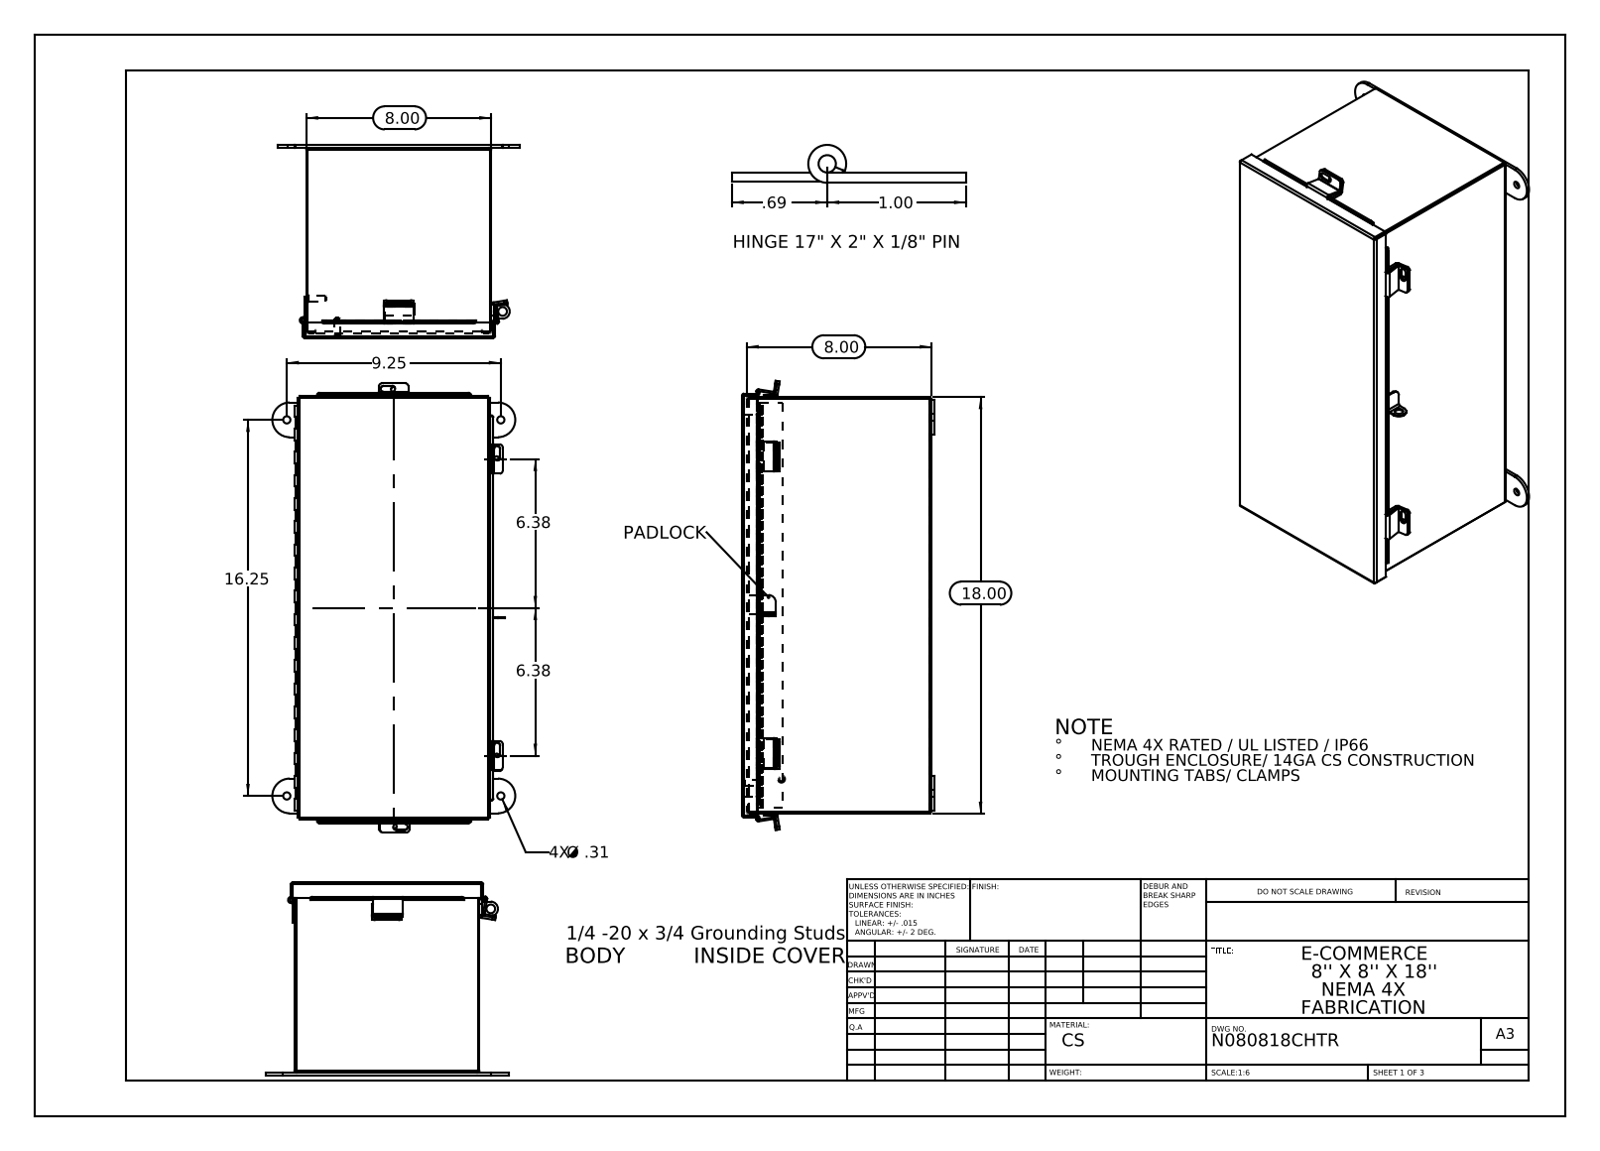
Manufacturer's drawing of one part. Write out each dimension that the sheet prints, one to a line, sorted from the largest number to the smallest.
18.00
16.25
9.25
8.00
8.00
6.38
6.38
1.00
.69
4X Ø .31
